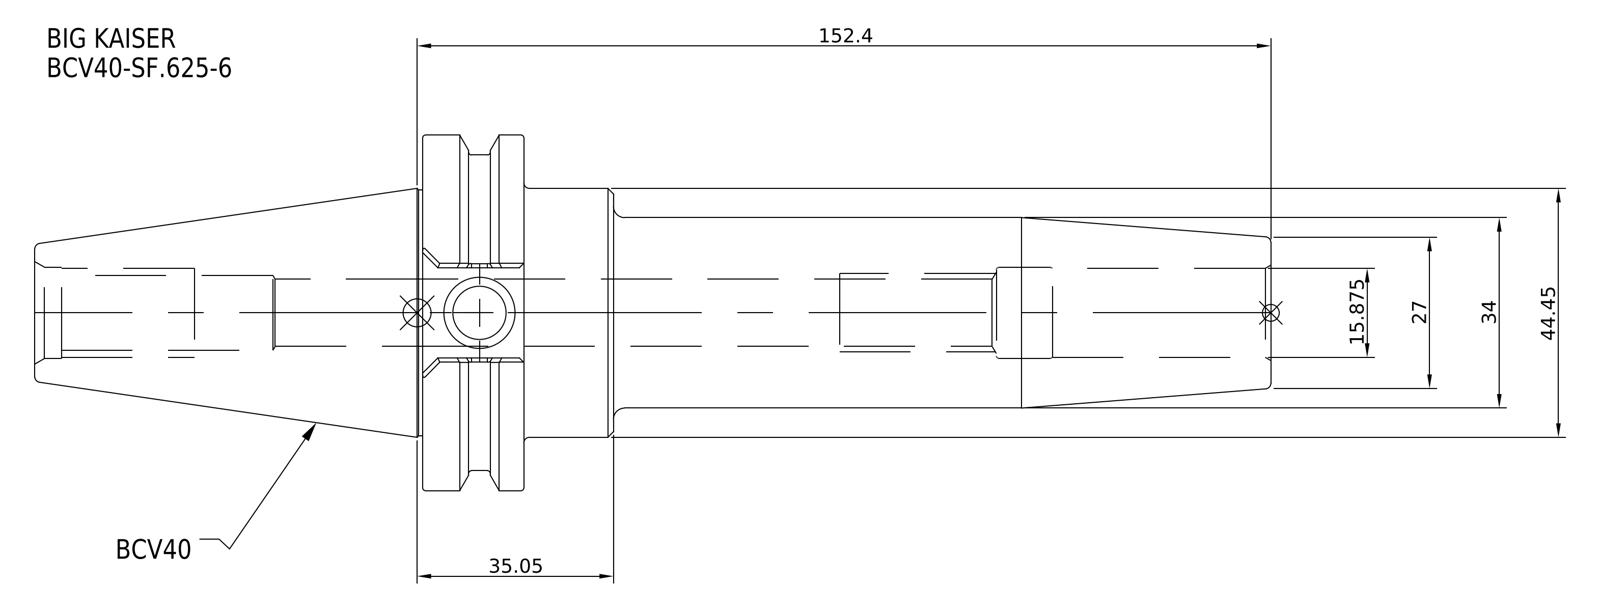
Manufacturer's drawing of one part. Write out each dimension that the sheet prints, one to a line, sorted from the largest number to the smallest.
152.4
44.45
35.05
34
27
15.875
